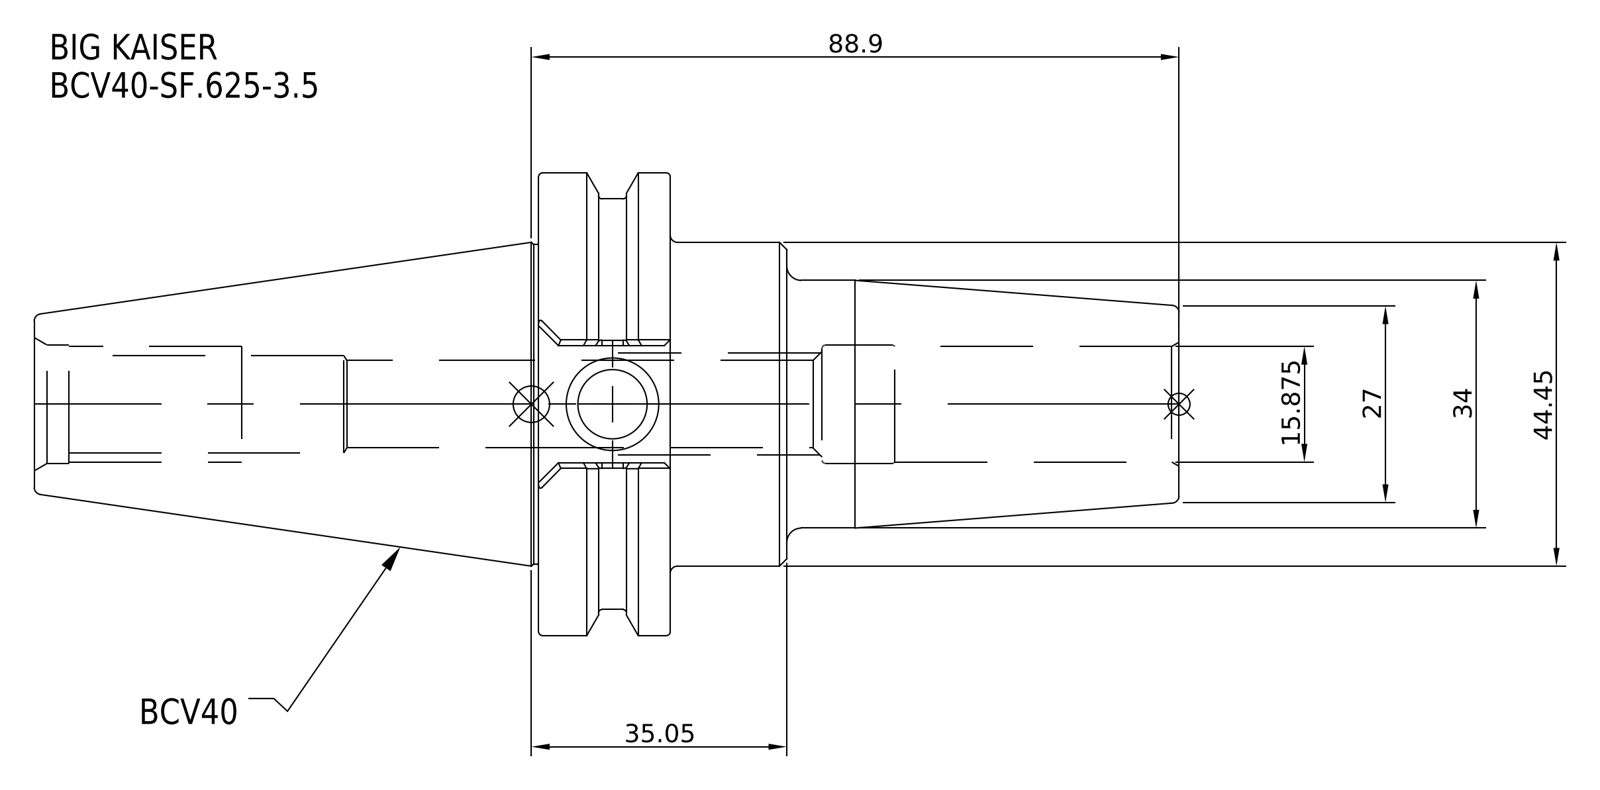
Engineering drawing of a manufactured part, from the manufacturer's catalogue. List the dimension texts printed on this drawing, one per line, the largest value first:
88.9
44.45
35.05
34
27
15.875
